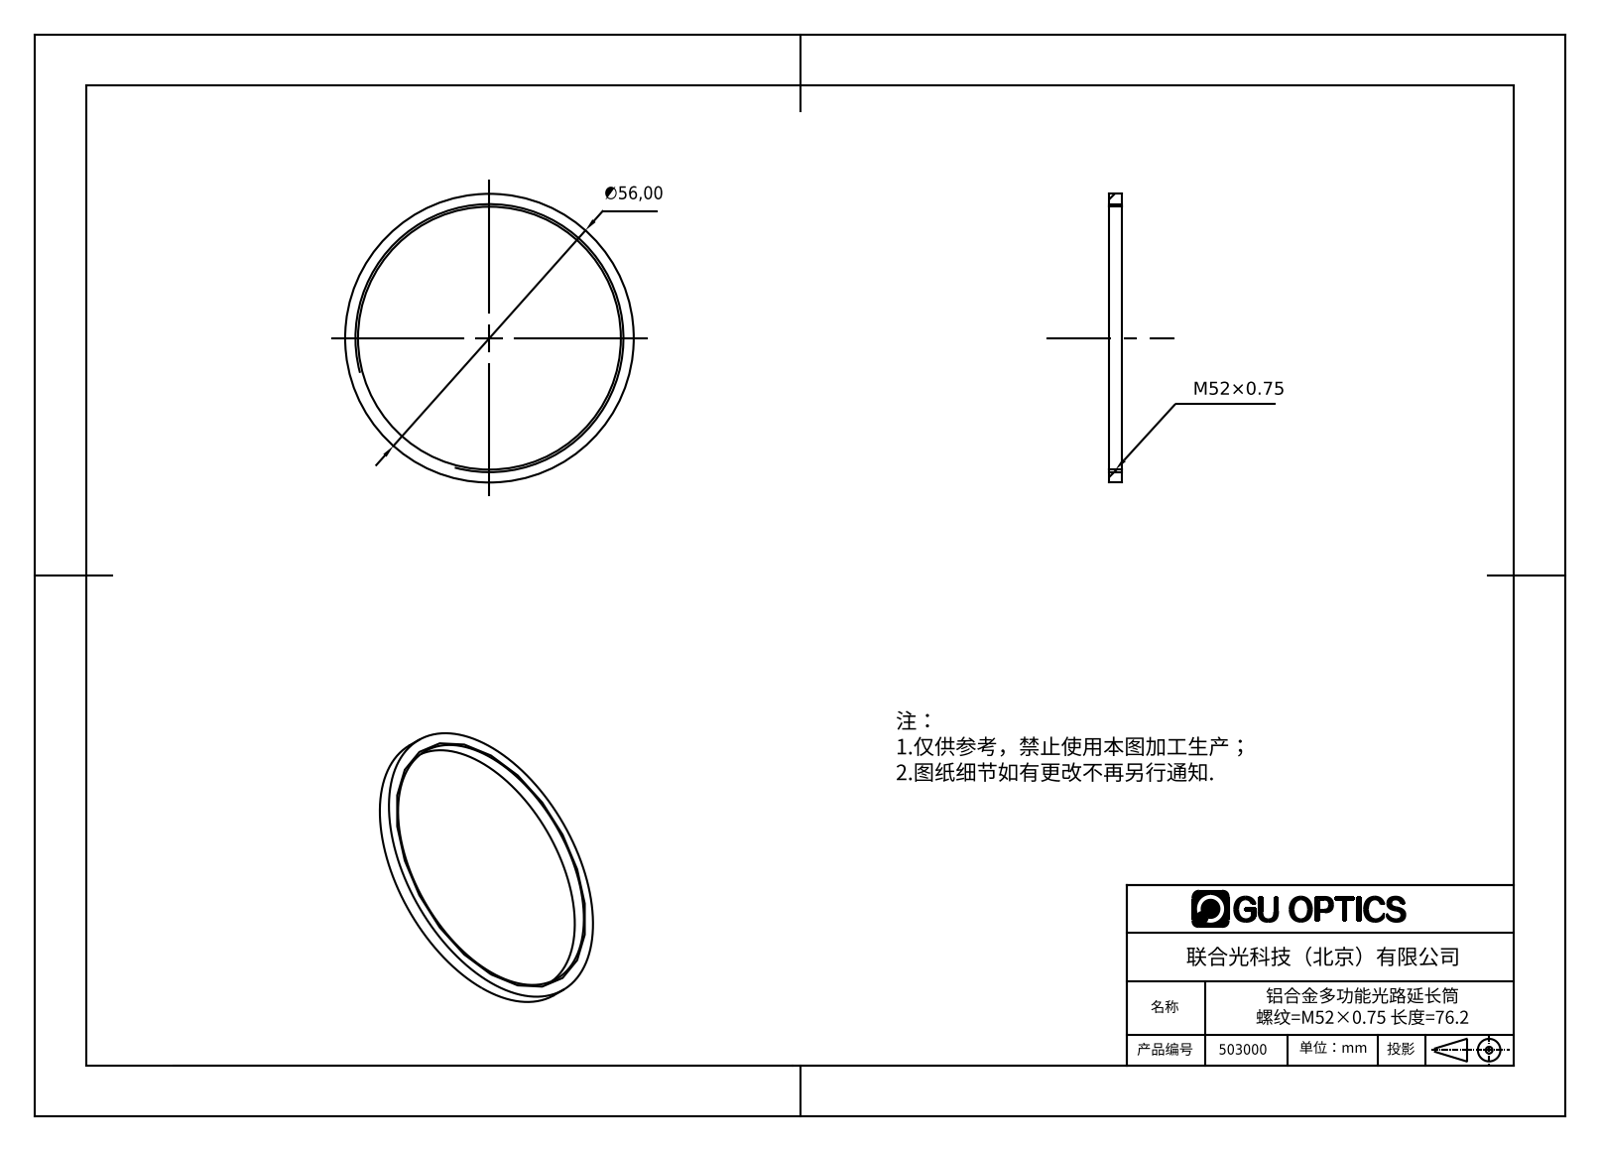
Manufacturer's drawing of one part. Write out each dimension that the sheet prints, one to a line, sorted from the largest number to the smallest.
∅56,00
